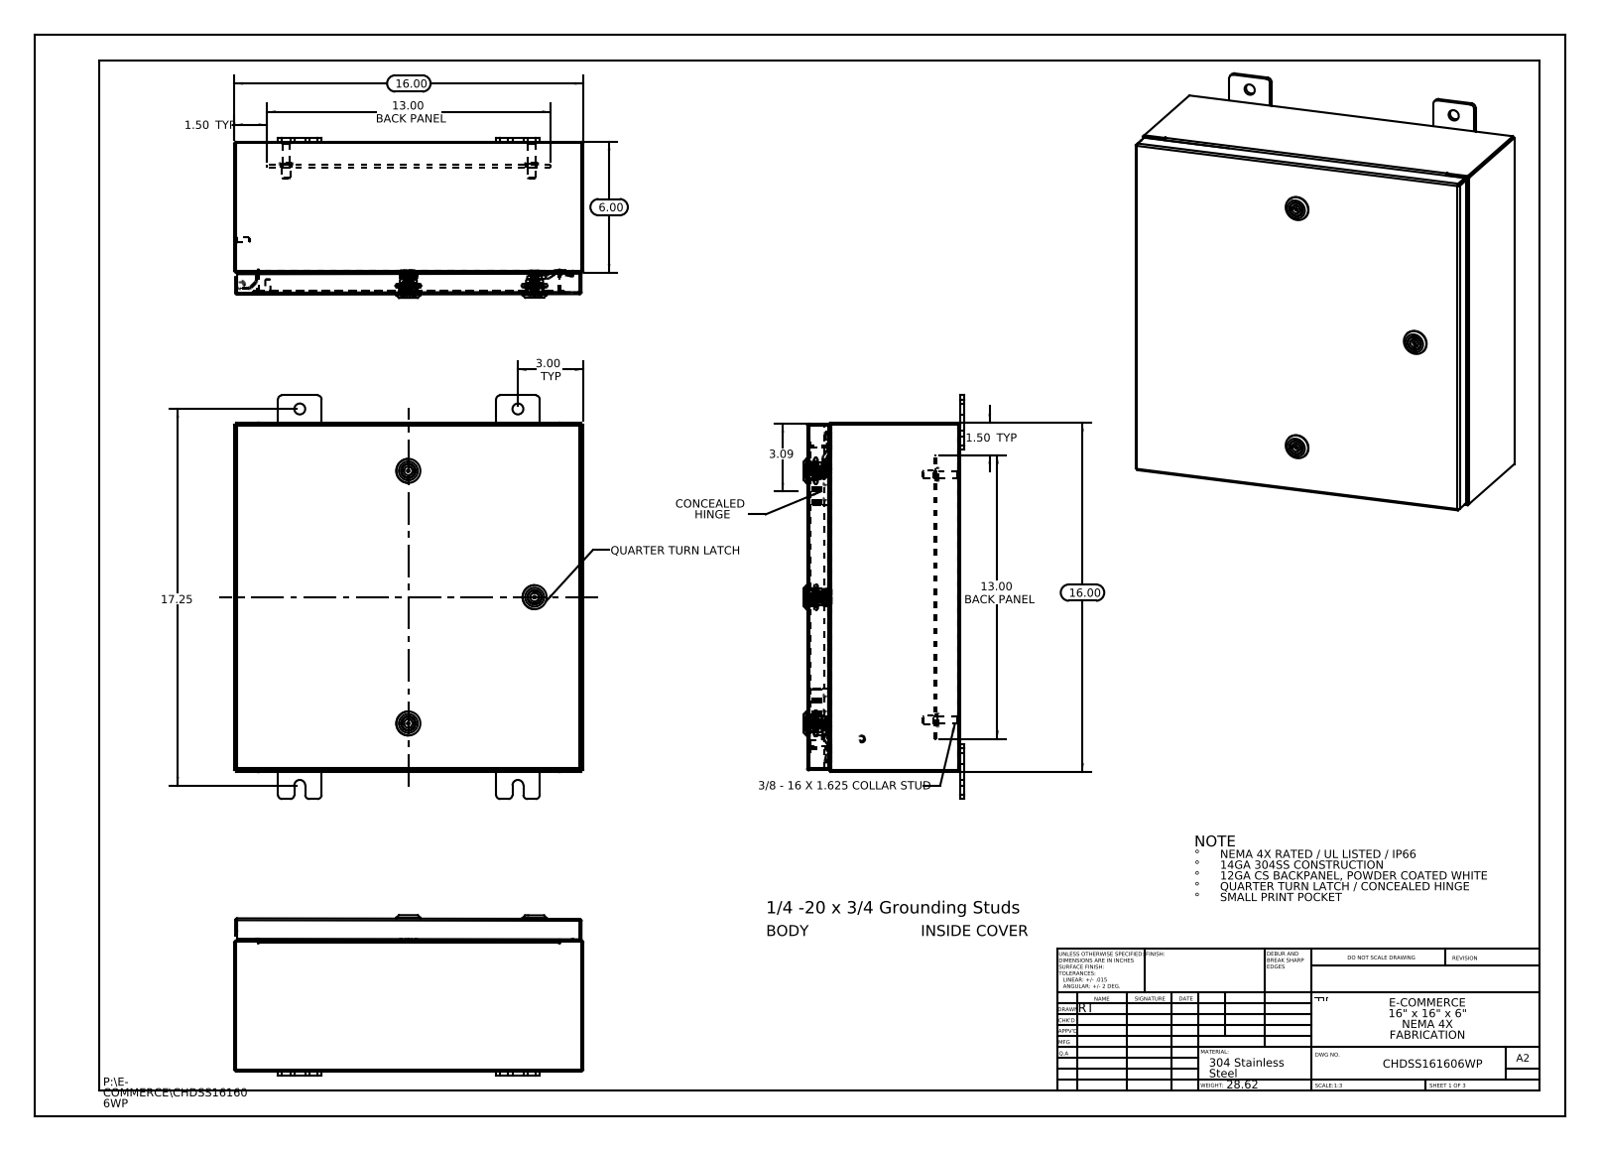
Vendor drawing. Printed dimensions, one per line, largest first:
17.25
16.00
16.00
13.00 BACK PANEL
13.00 BACK PANEL
6.00
3.09
3.00 TYP
1.50 TYP
1.50 TYP
